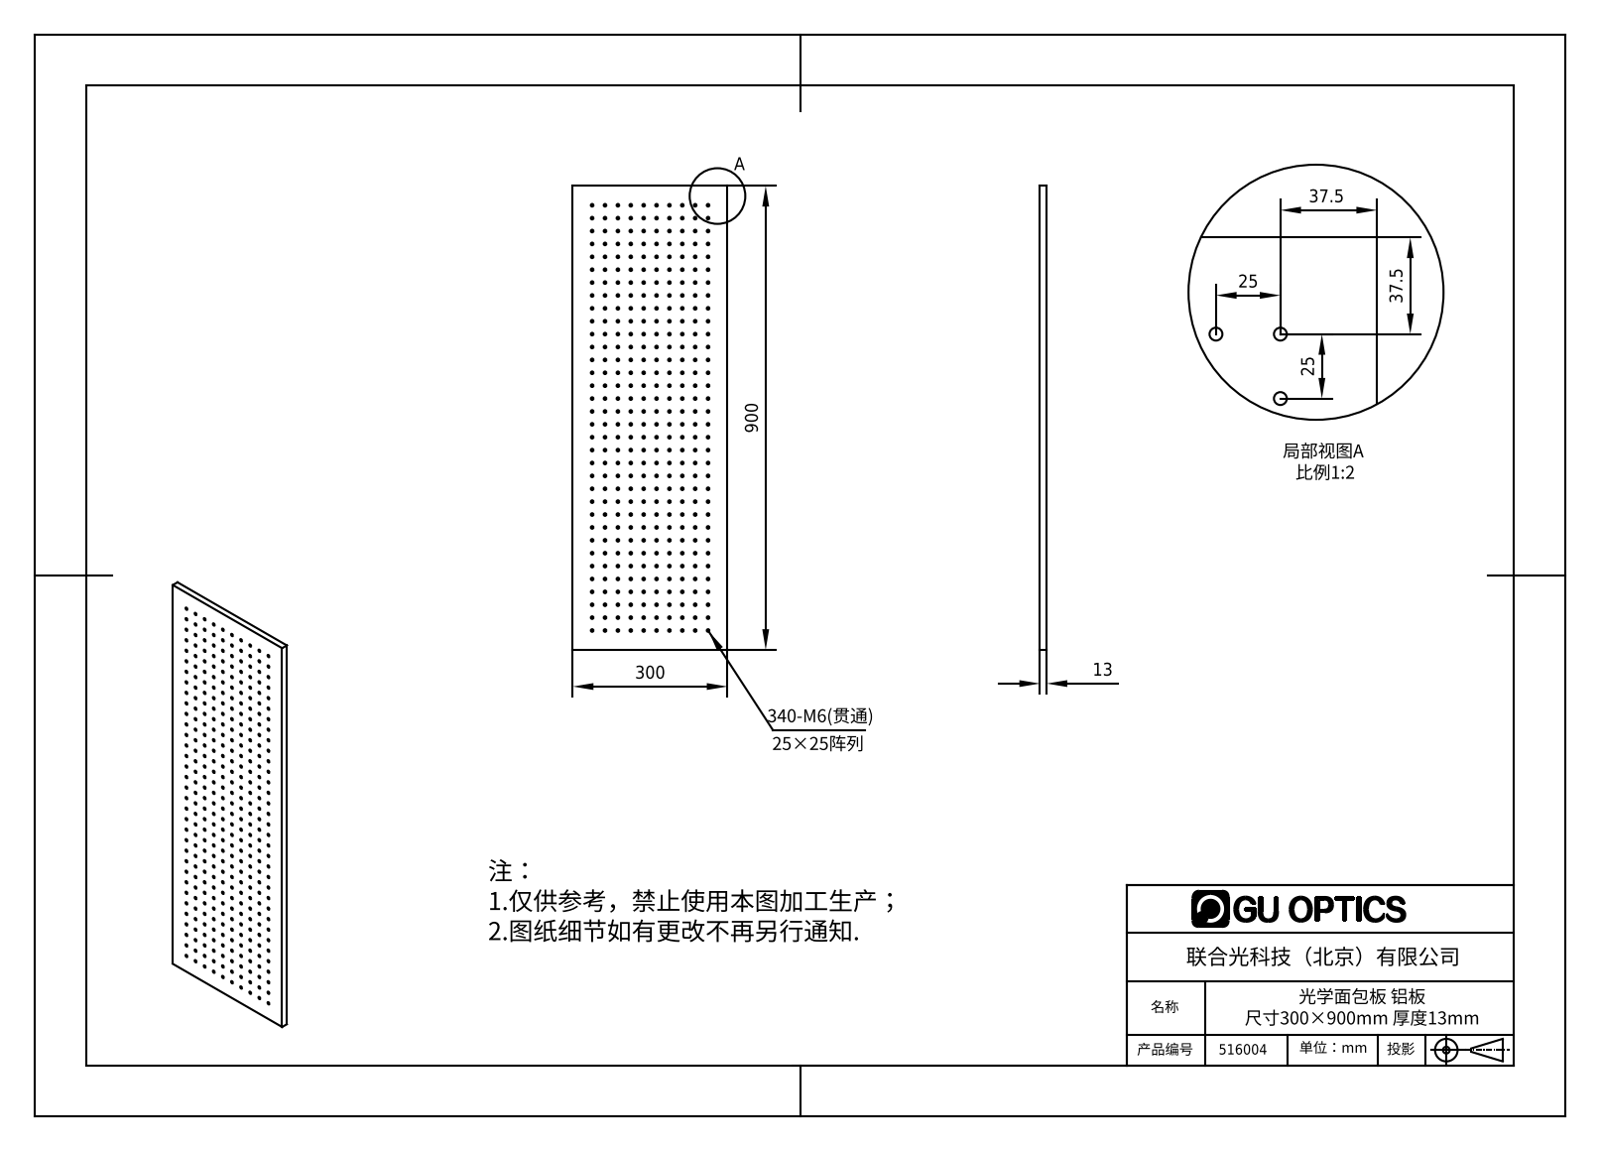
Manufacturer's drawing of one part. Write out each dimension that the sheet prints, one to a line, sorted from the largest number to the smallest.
900
300
37.5
37.5
25
25
13
